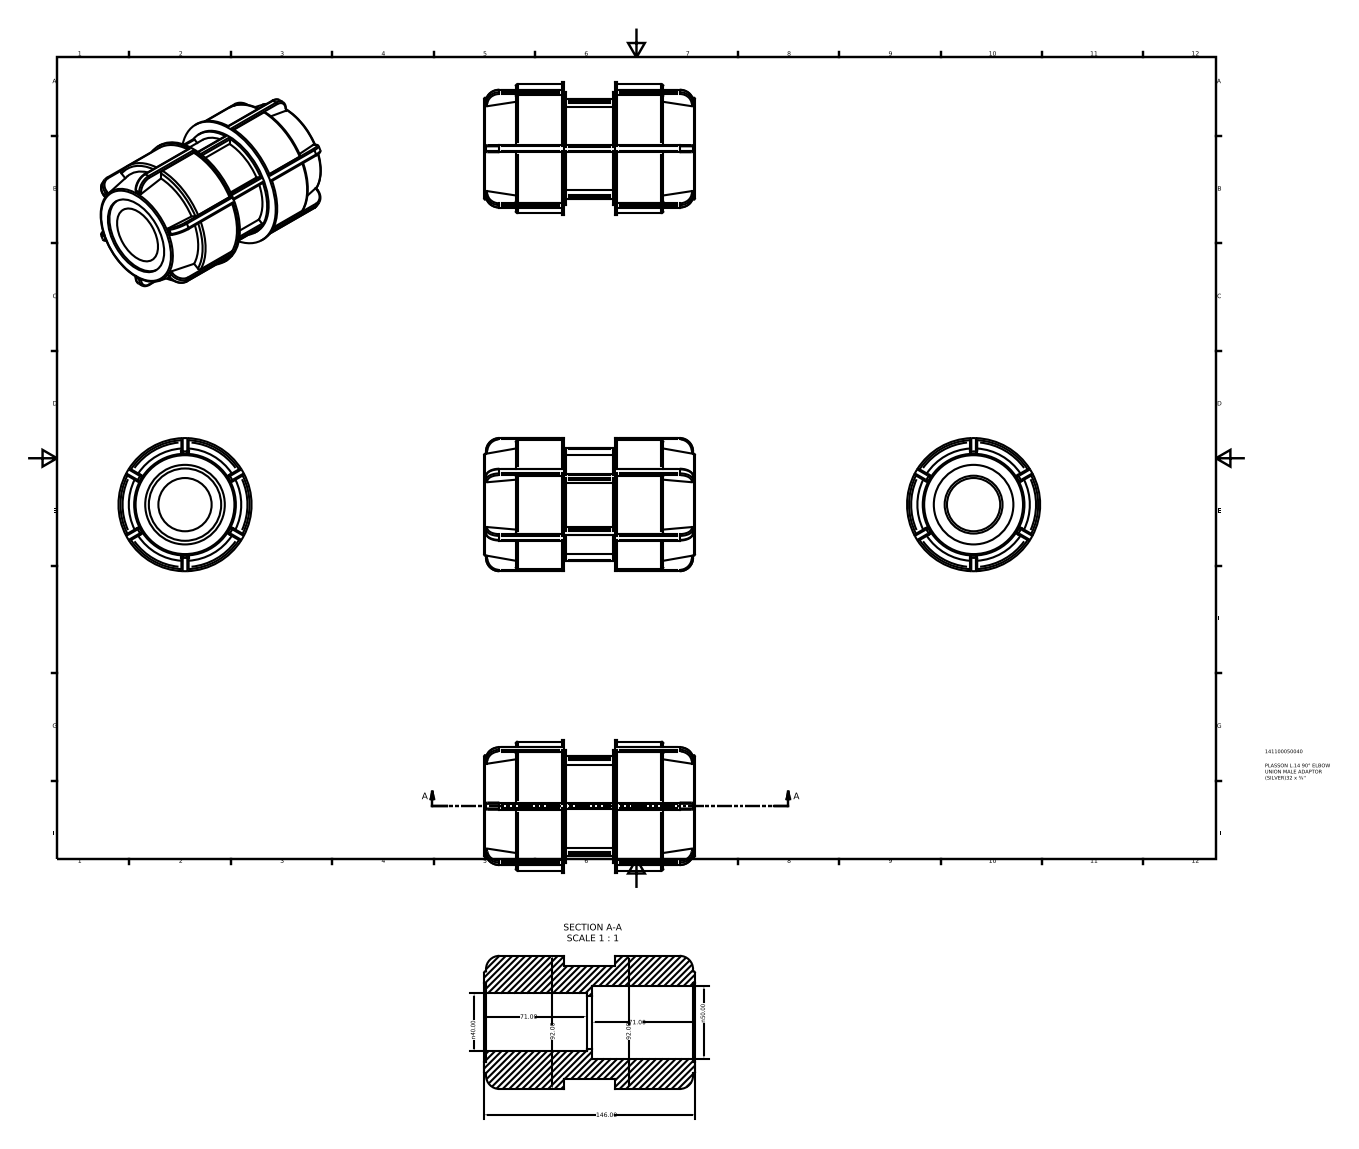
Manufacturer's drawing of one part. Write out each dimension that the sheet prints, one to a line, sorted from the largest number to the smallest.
146.00
92.00
92.00
71.00
71.00
n50.00
n40.00
